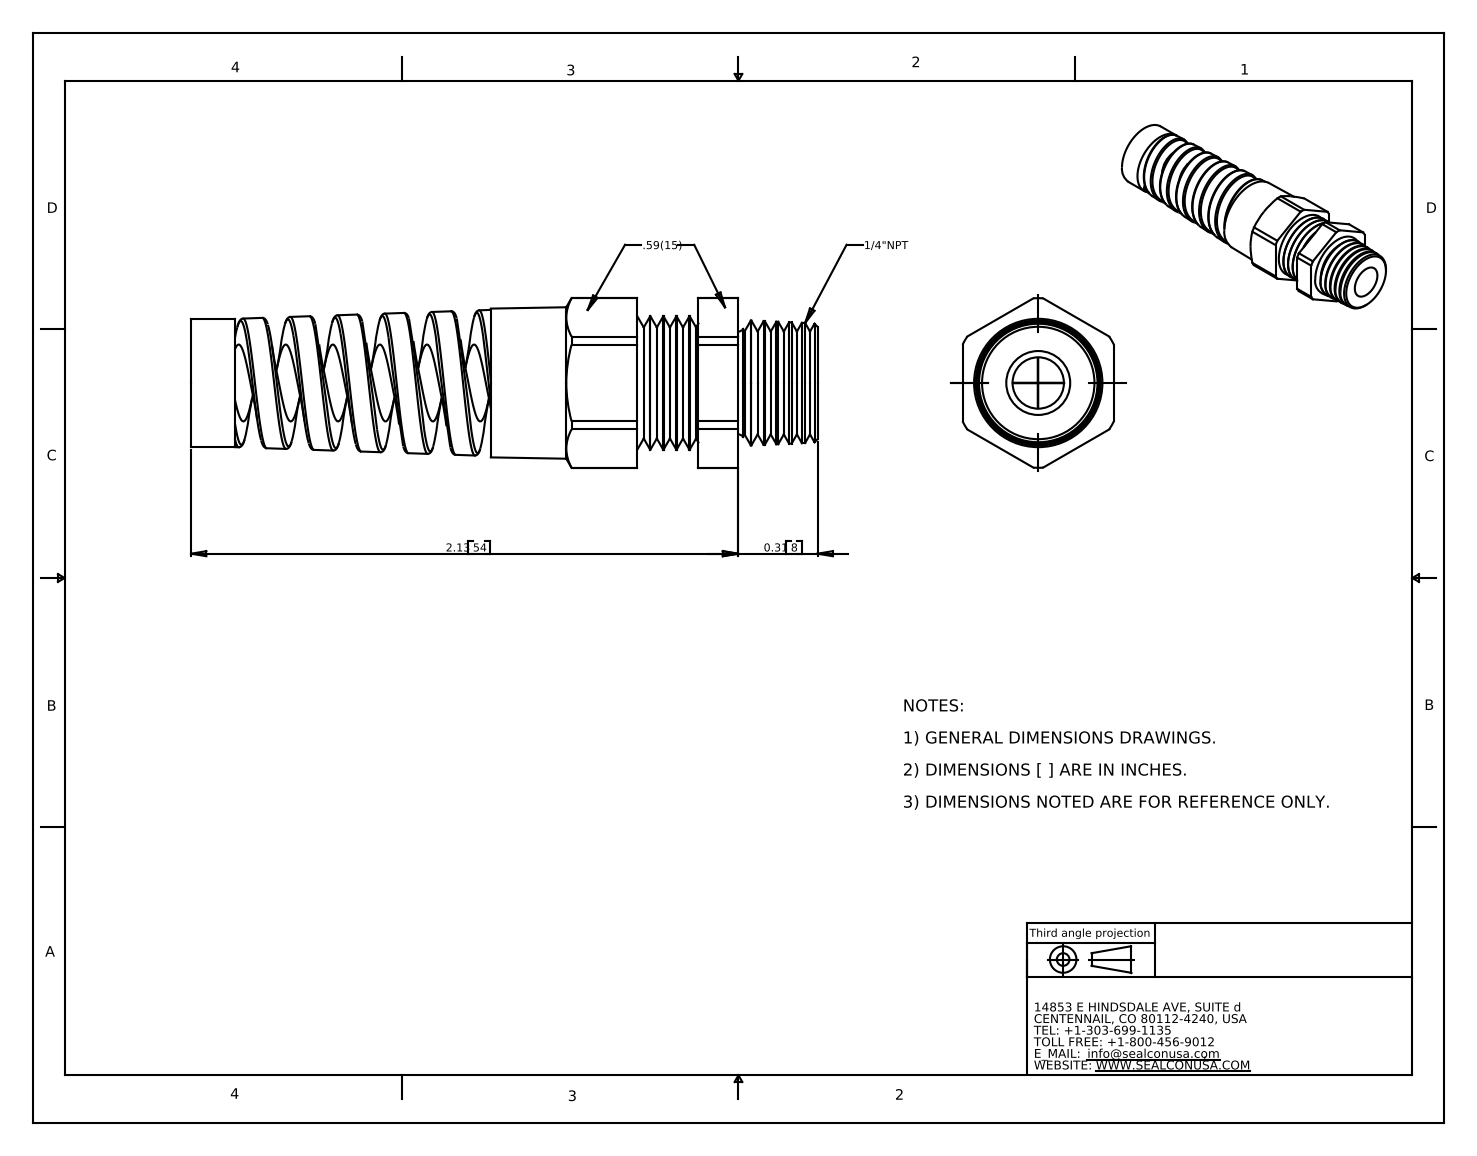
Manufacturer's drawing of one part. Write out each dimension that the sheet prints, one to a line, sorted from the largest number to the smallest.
2.13 54
0.31 8
